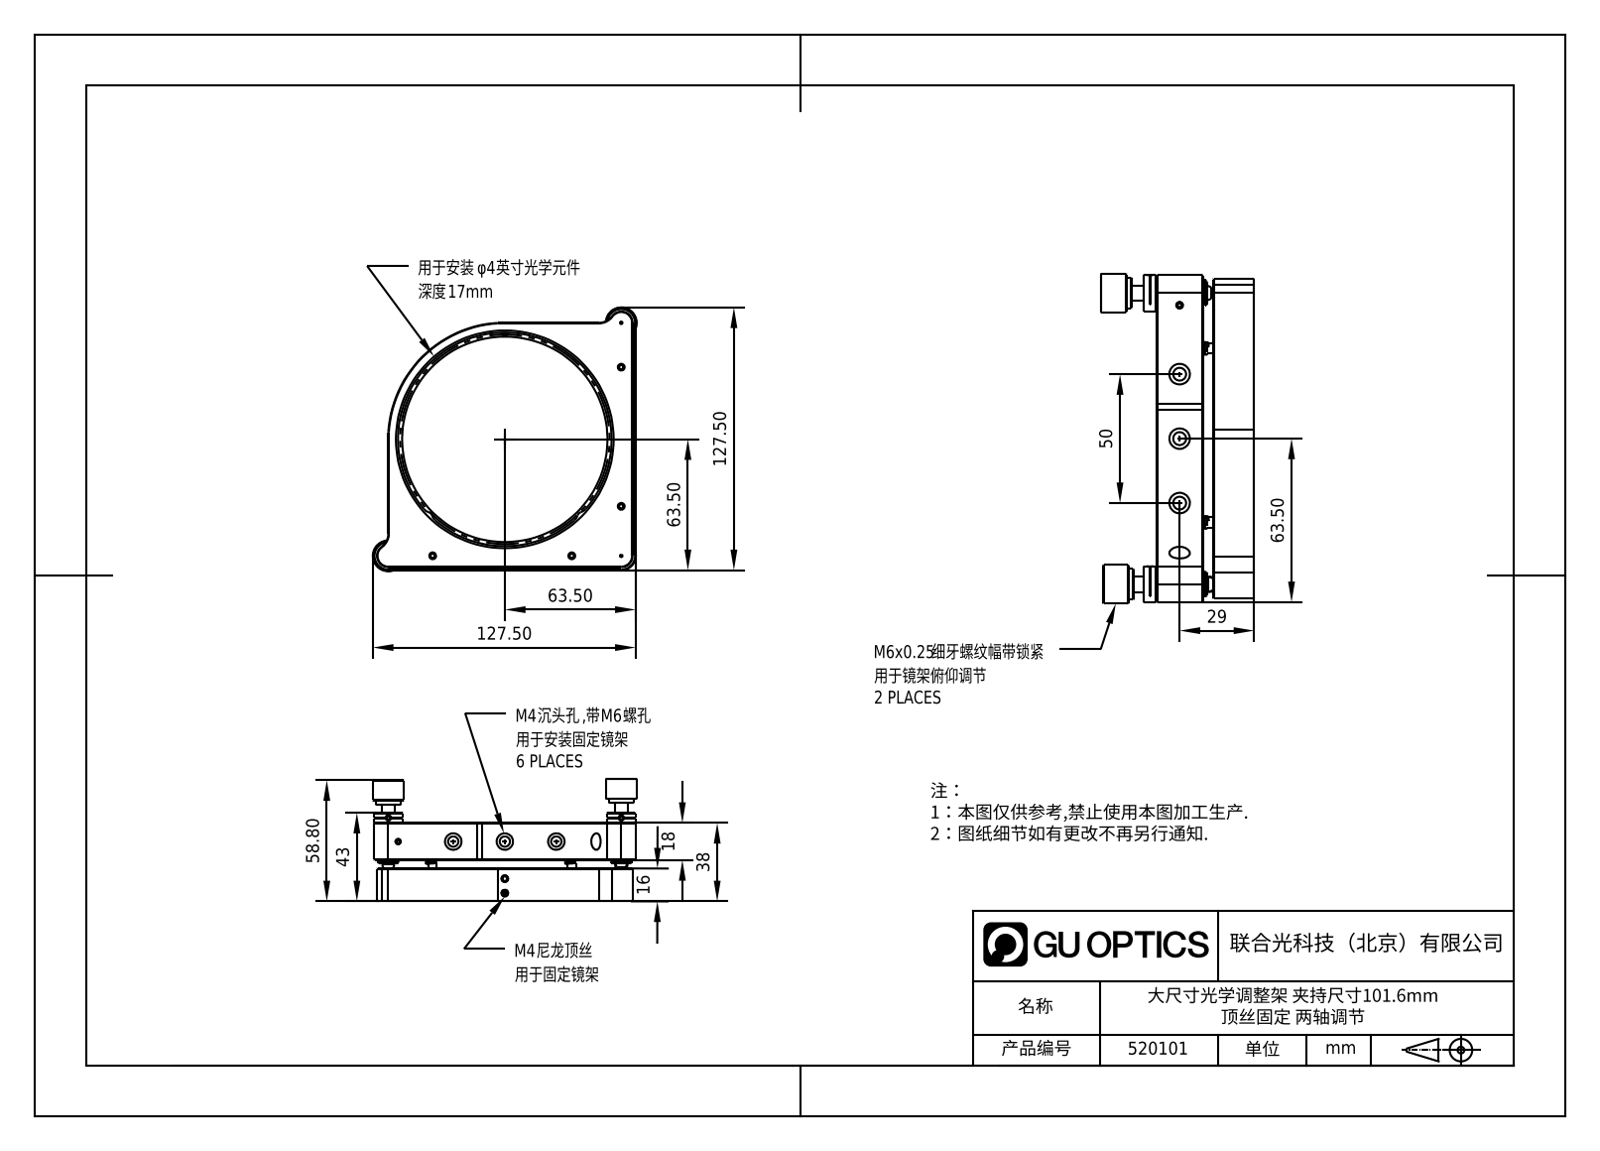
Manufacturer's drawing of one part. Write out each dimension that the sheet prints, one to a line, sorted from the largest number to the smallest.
127.50
127.50
63.50
63.50
63.50
58.80
50
43
38
29
18
16
